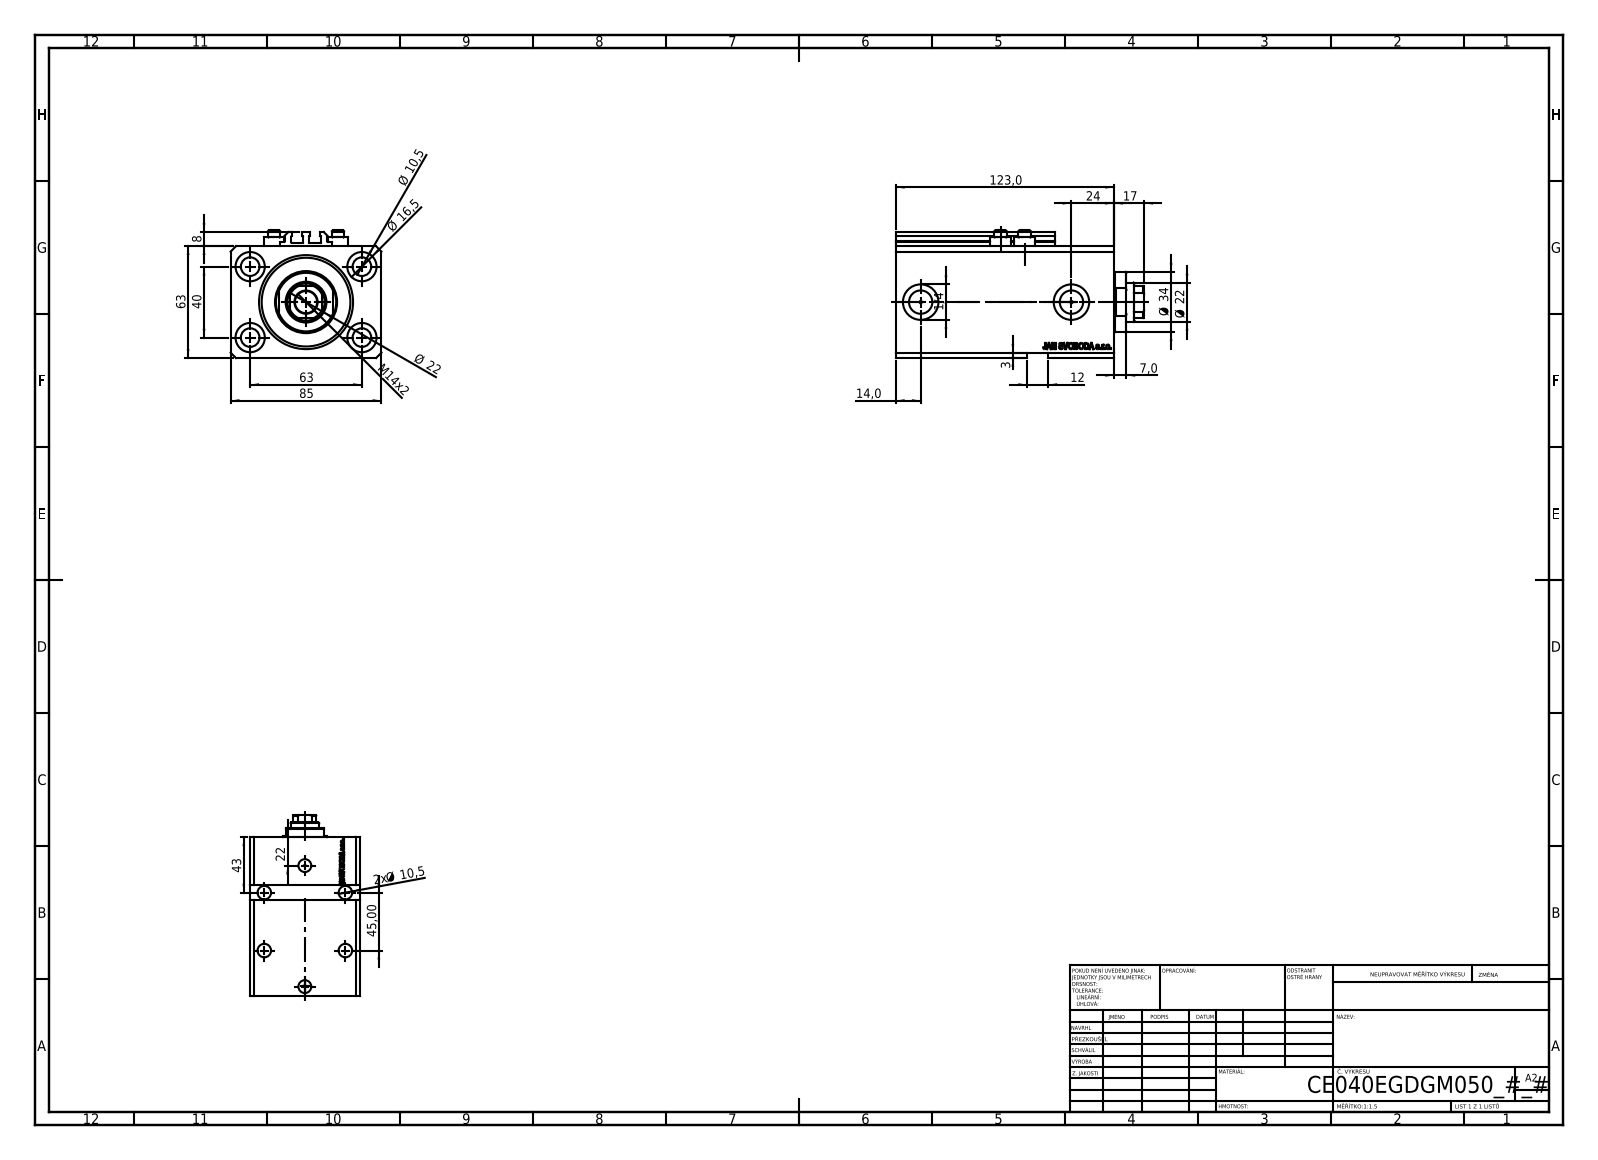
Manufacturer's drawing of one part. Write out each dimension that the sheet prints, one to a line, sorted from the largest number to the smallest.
123,0
85
63
63
45,00
43
40
Ø 34
24
Ø 22
Ø 22
22
17
Ø 16,5
M14x2
14,0
12
Ø 10,5
2x Ø 10,5
8
7,0
3
1/4
